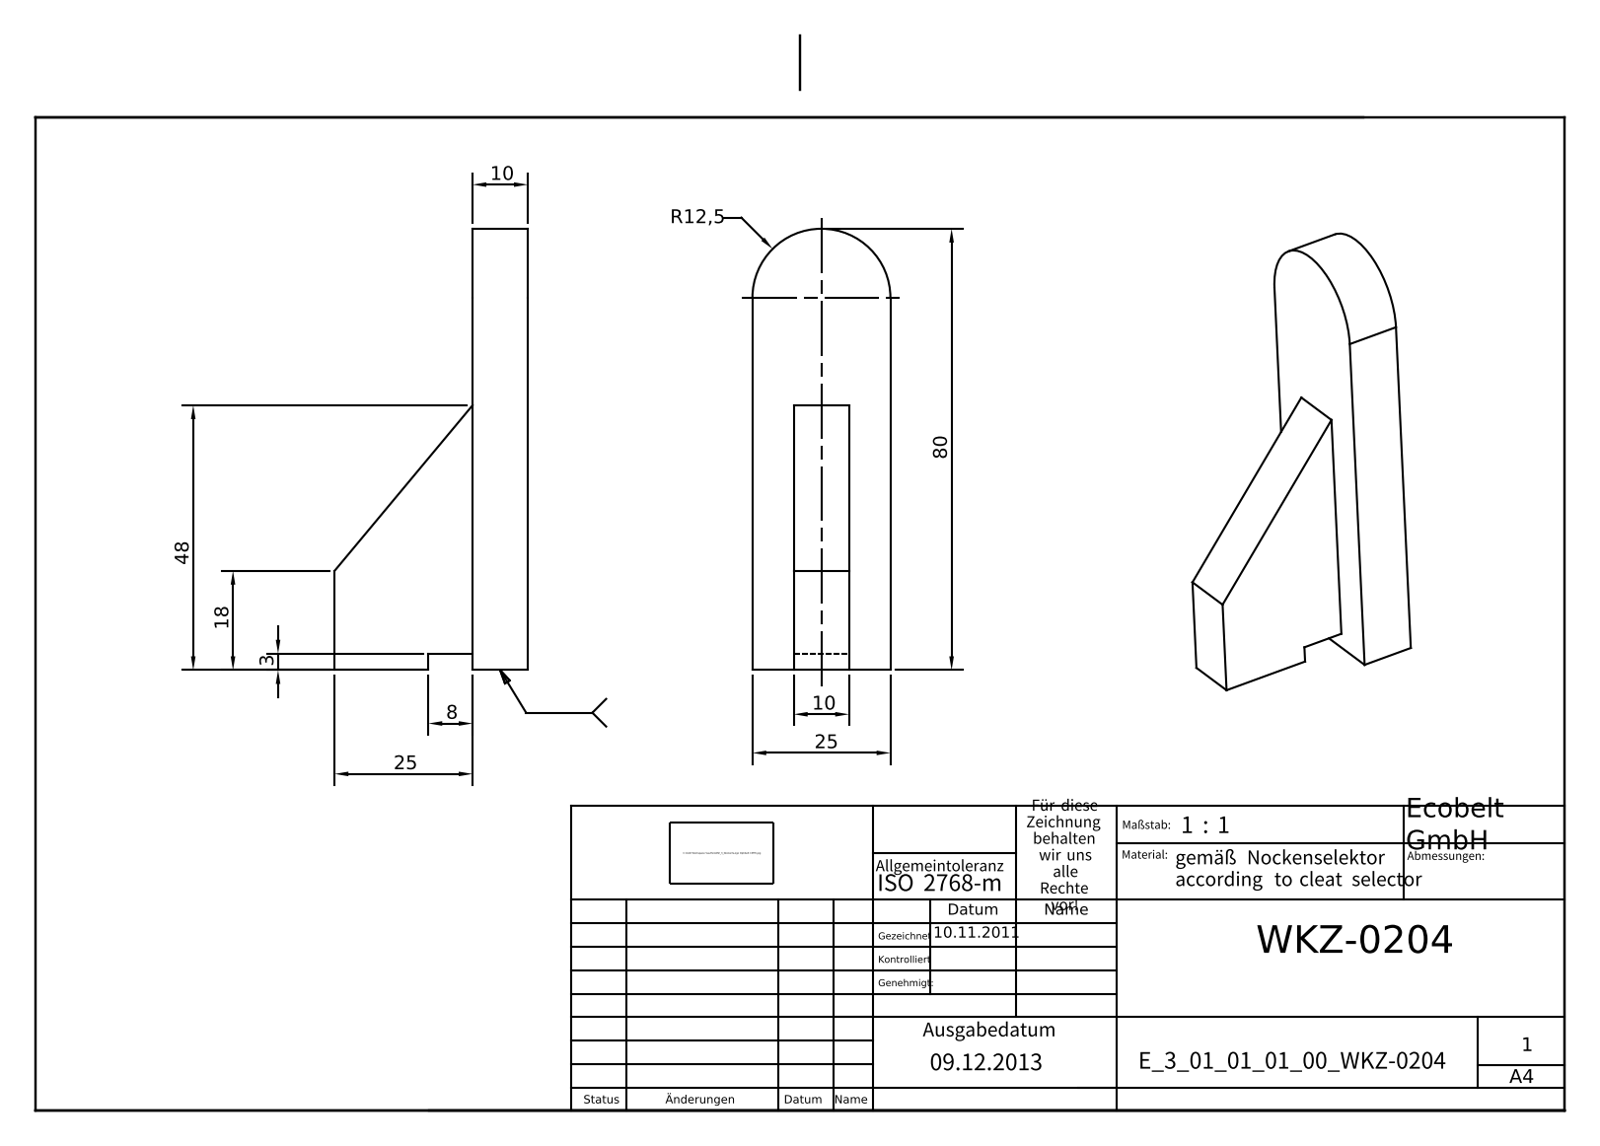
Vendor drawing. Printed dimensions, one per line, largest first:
80
48
25
25
18
R12,5
10
10
8
3
